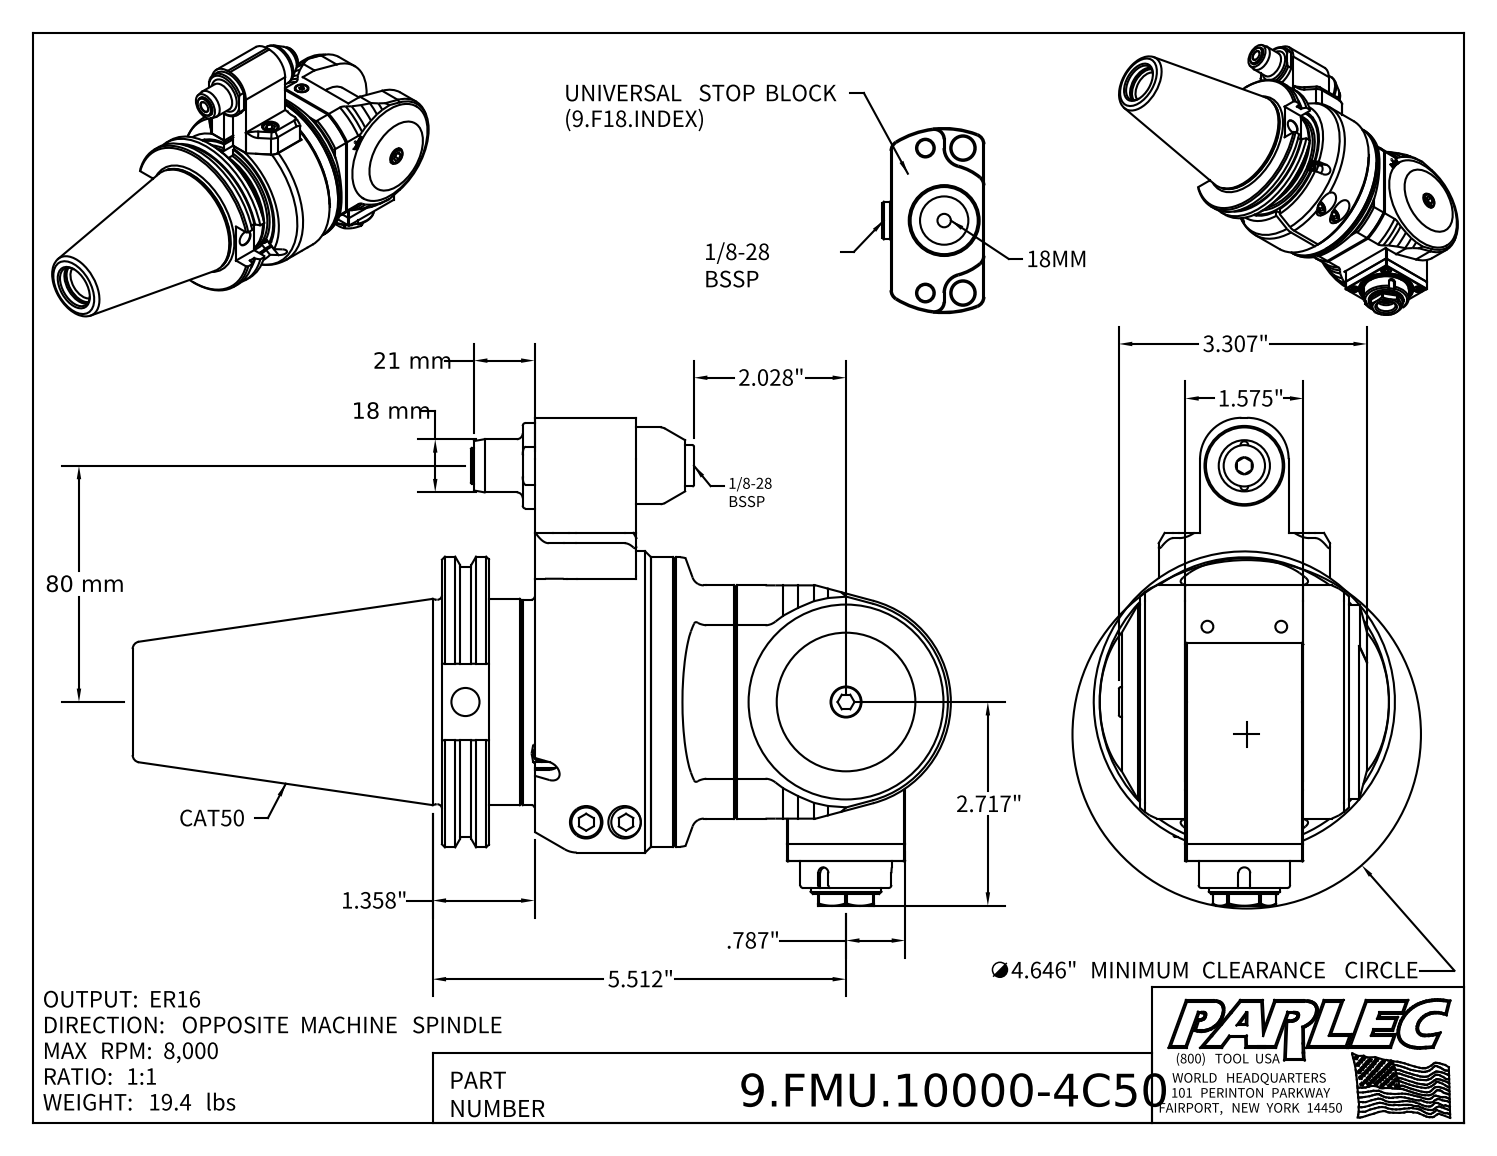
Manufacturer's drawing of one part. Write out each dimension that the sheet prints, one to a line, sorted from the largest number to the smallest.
80 mm
21 mm
18 mm
5.512"
∅4.646" MINIMUM CLEARANCE CIRCLE
3.307"
2.717"
2.028"
1.575"
1.358"
.787"
